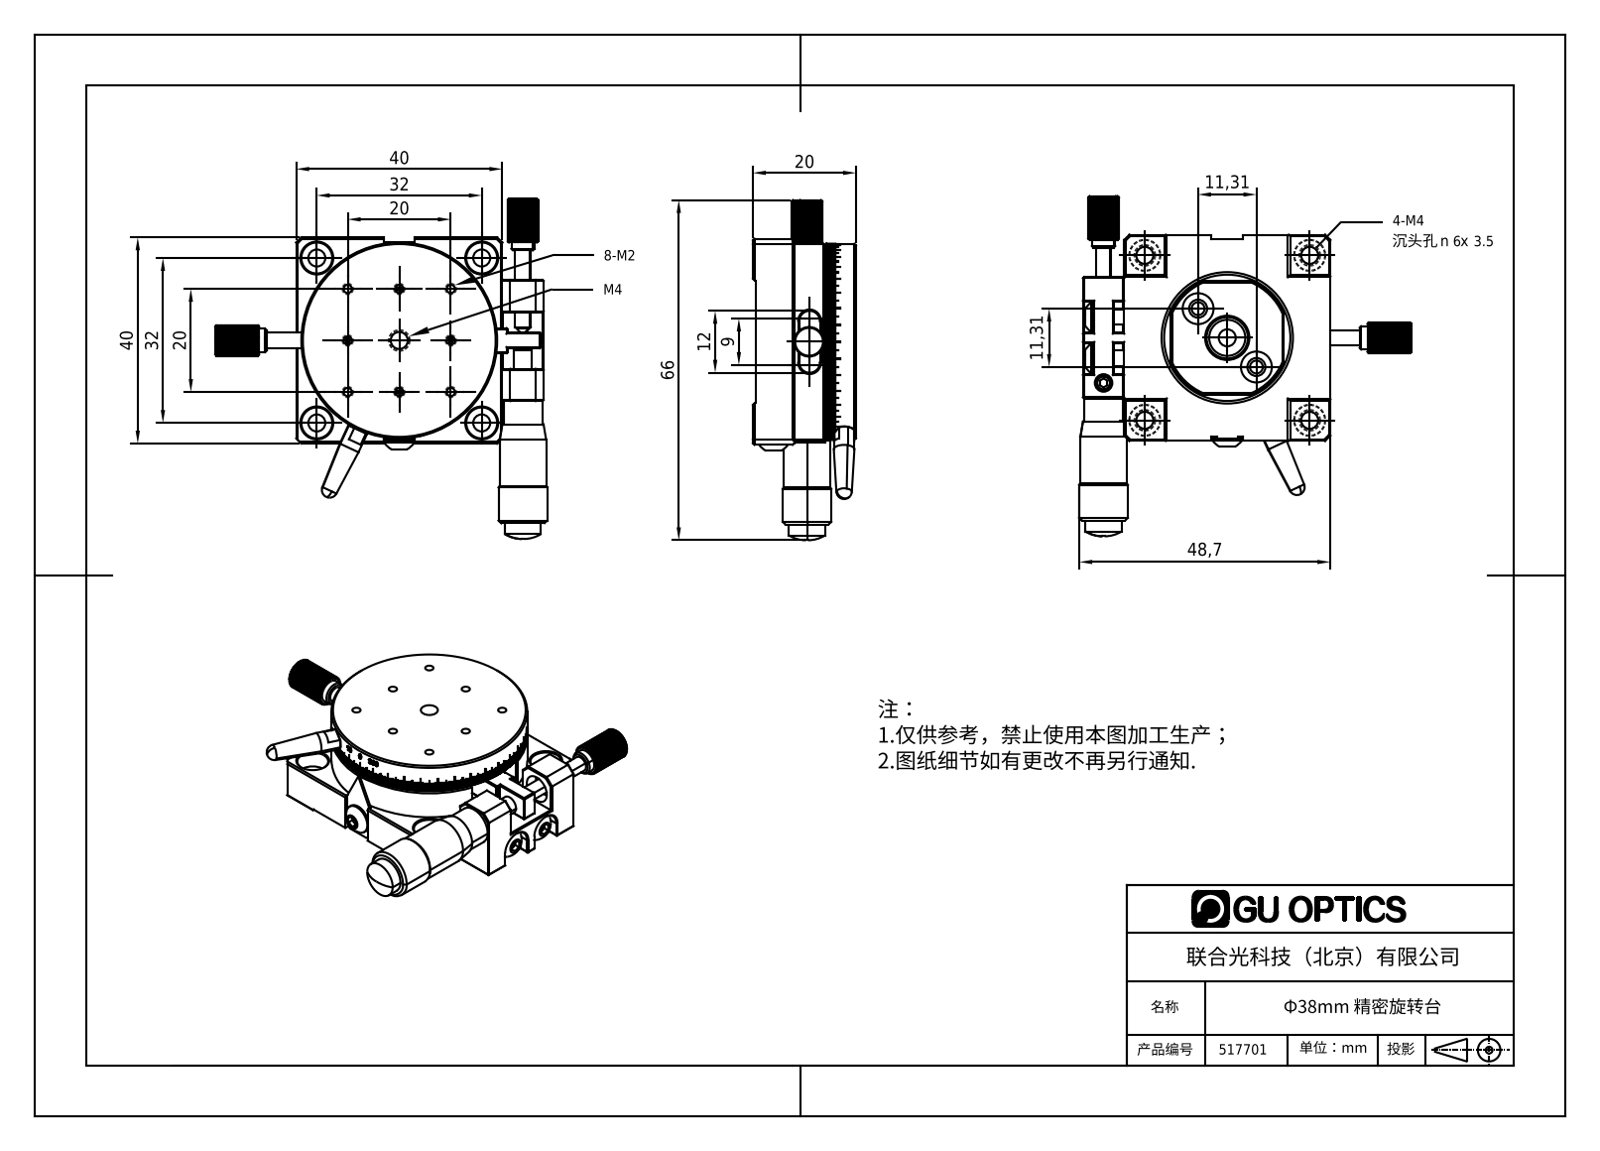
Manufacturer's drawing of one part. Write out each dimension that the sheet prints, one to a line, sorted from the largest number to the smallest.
66
48,7
40
40
32
32
20
20
20
12
11,31
11,31
9
